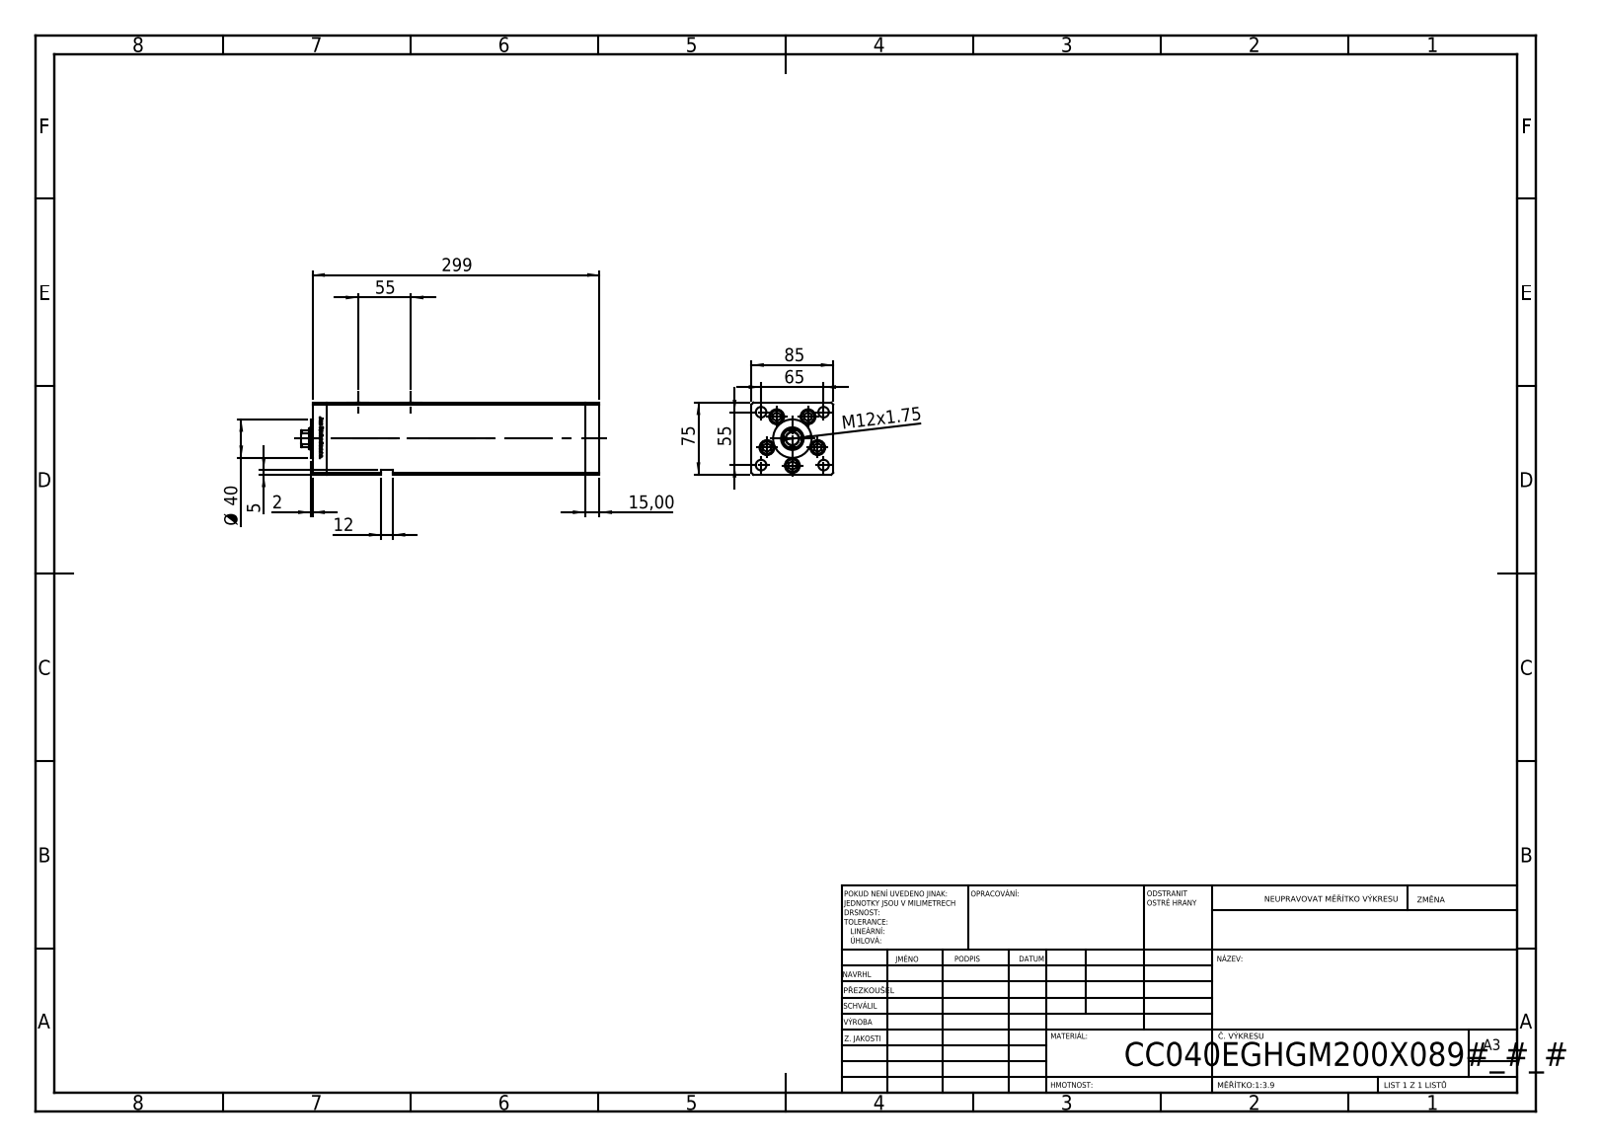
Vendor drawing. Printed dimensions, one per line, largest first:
299
85
75
65
55
55
Ø 40
15,00
12
M12x1.75
5
2
